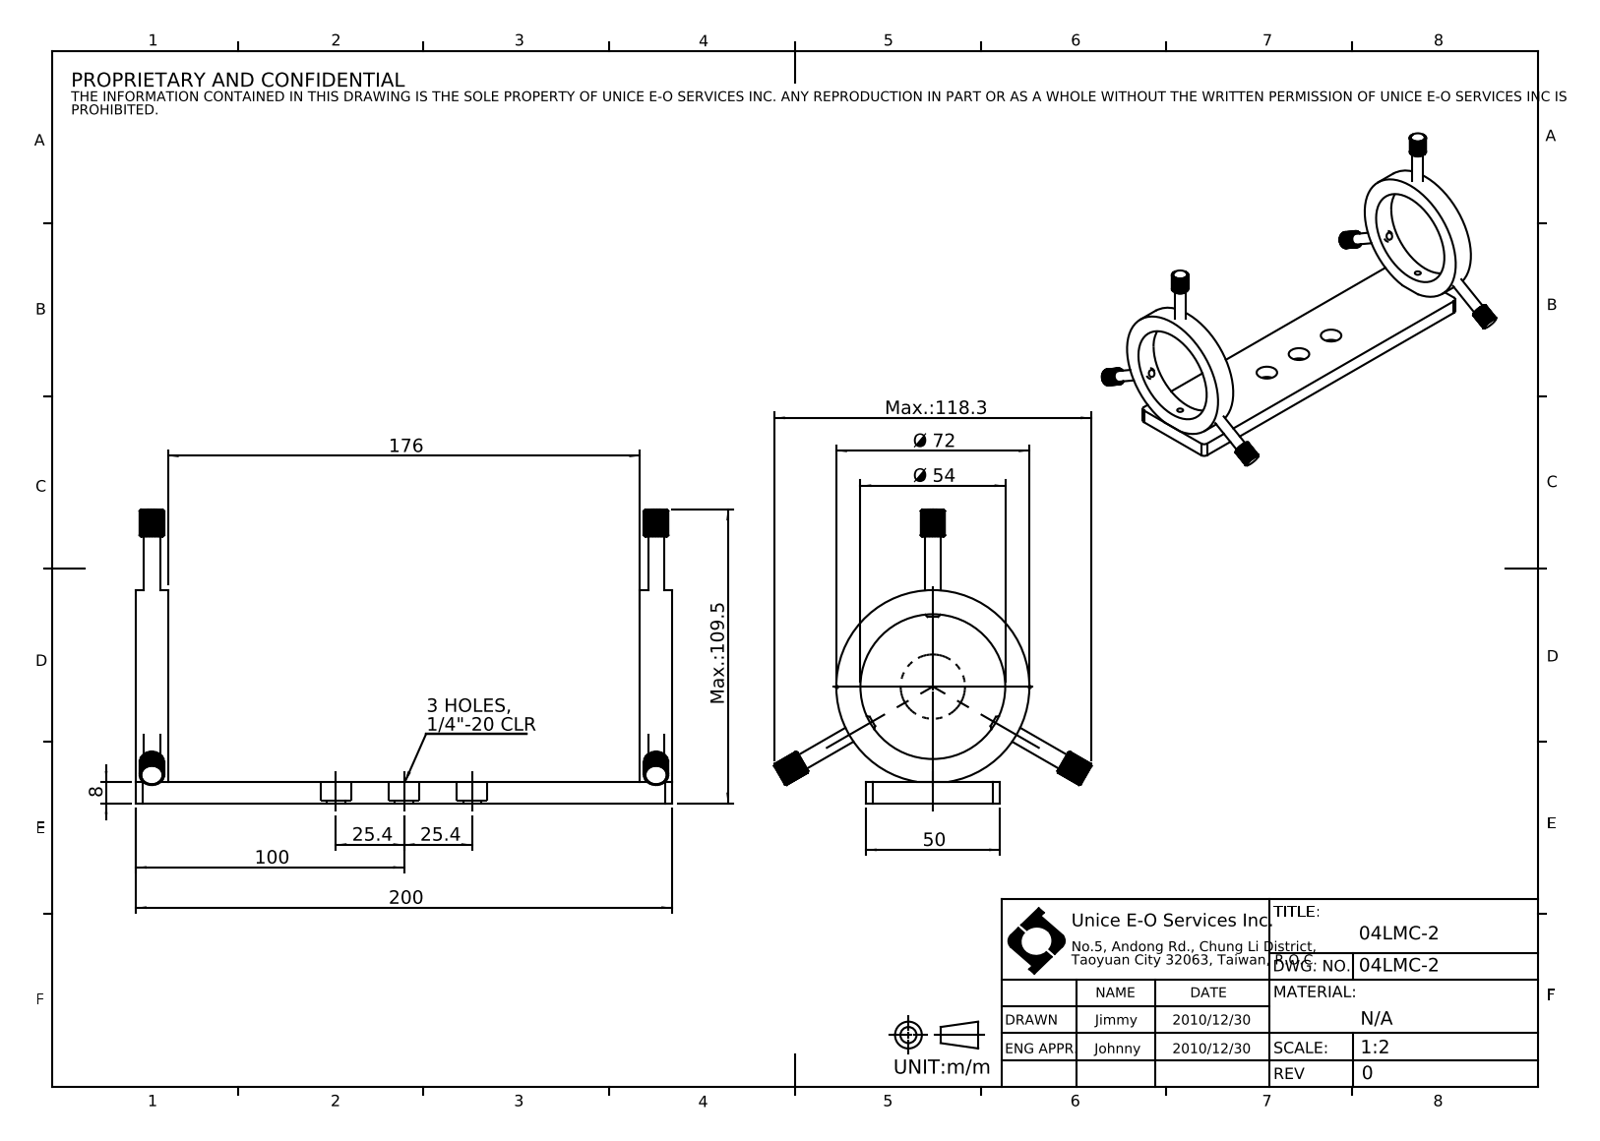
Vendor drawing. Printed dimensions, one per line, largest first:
200
176
Max.: 118.3
Max.: 109.5
100
Ø 72
Ø 54
50
25.4
25.4
8
